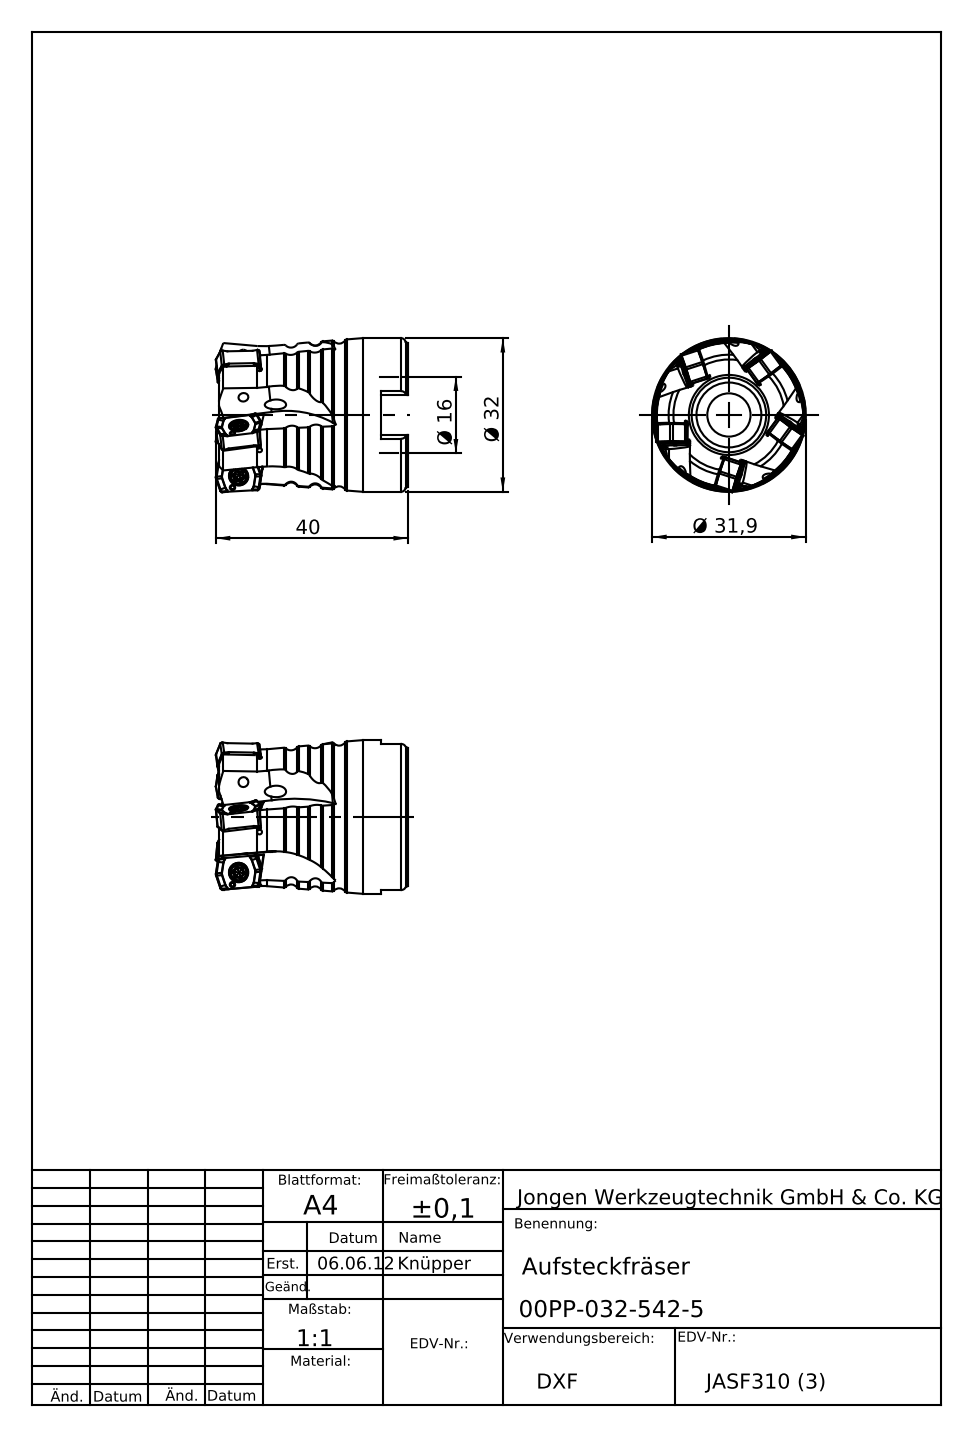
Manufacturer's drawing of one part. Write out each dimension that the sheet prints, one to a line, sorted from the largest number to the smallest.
40
Ø 32
Ø 31,9
Ø 16
